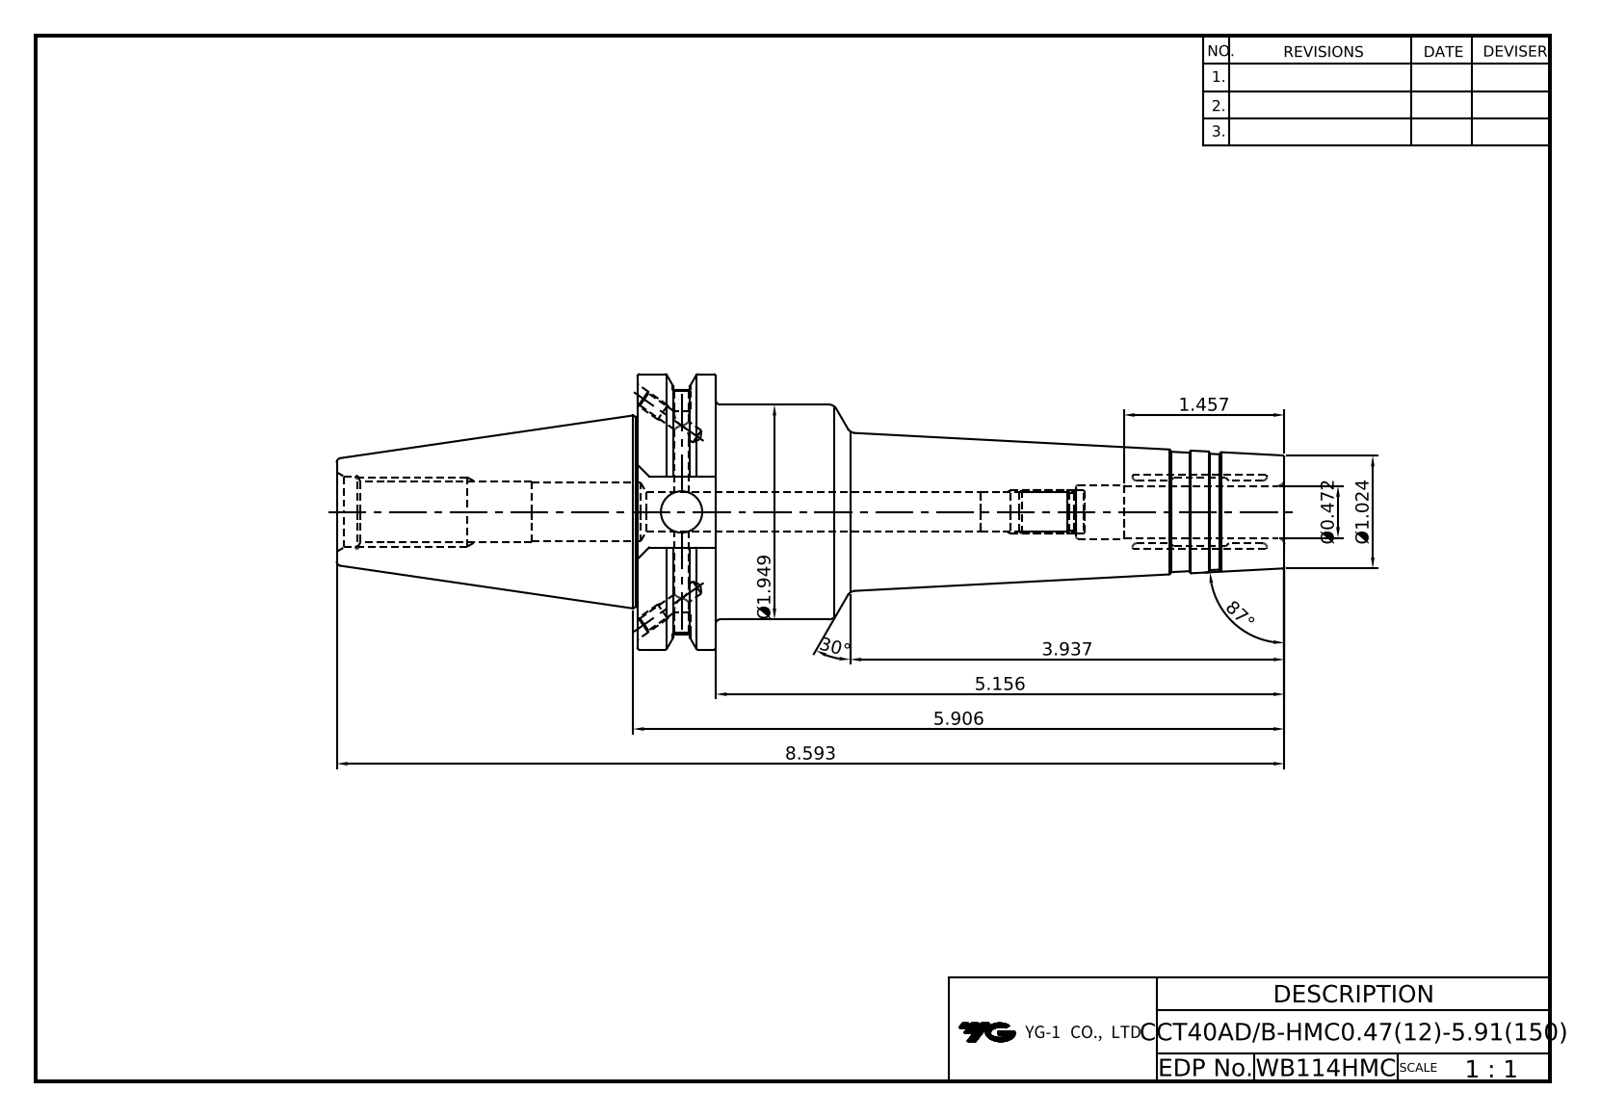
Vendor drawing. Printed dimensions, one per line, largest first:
87°
30°
8.593
5.906
5.156
3.937
Ø1.949
1.457
Ø1.024
Ø0.472
